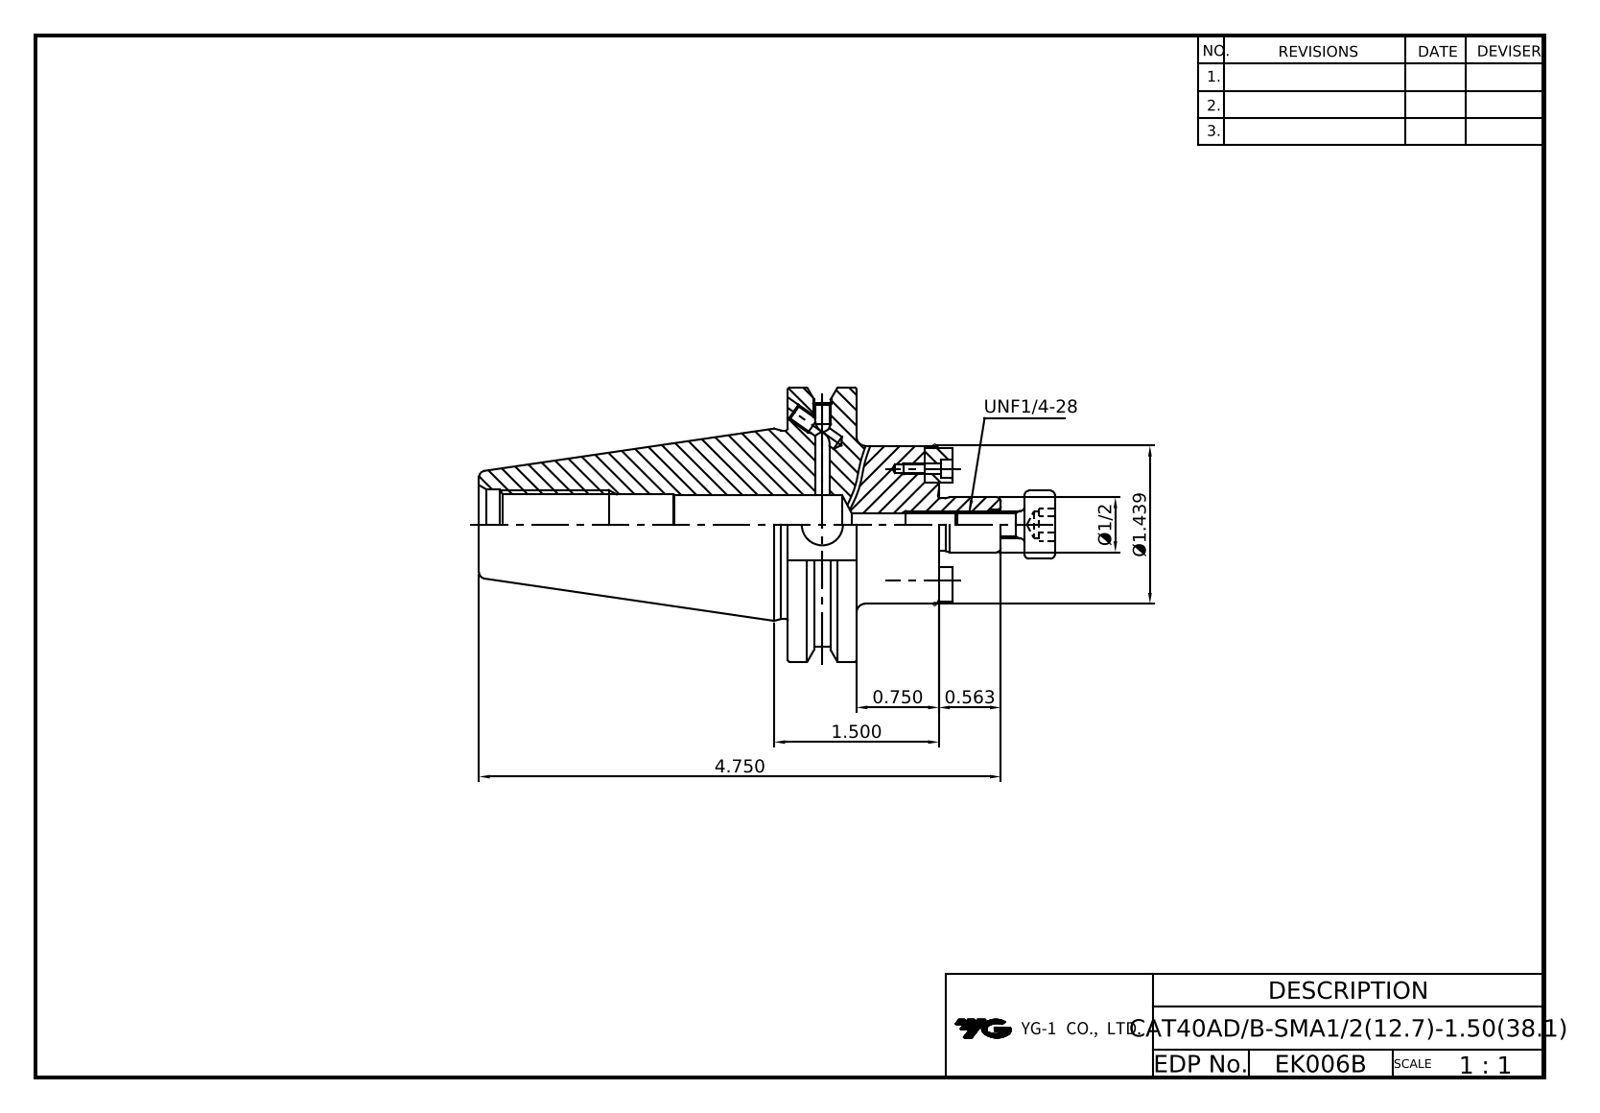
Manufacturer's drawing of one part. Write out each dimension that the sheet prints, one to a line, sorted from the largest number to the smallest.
4.750
1.500
Ø1.439
0.750
0.563
Ø1/2
